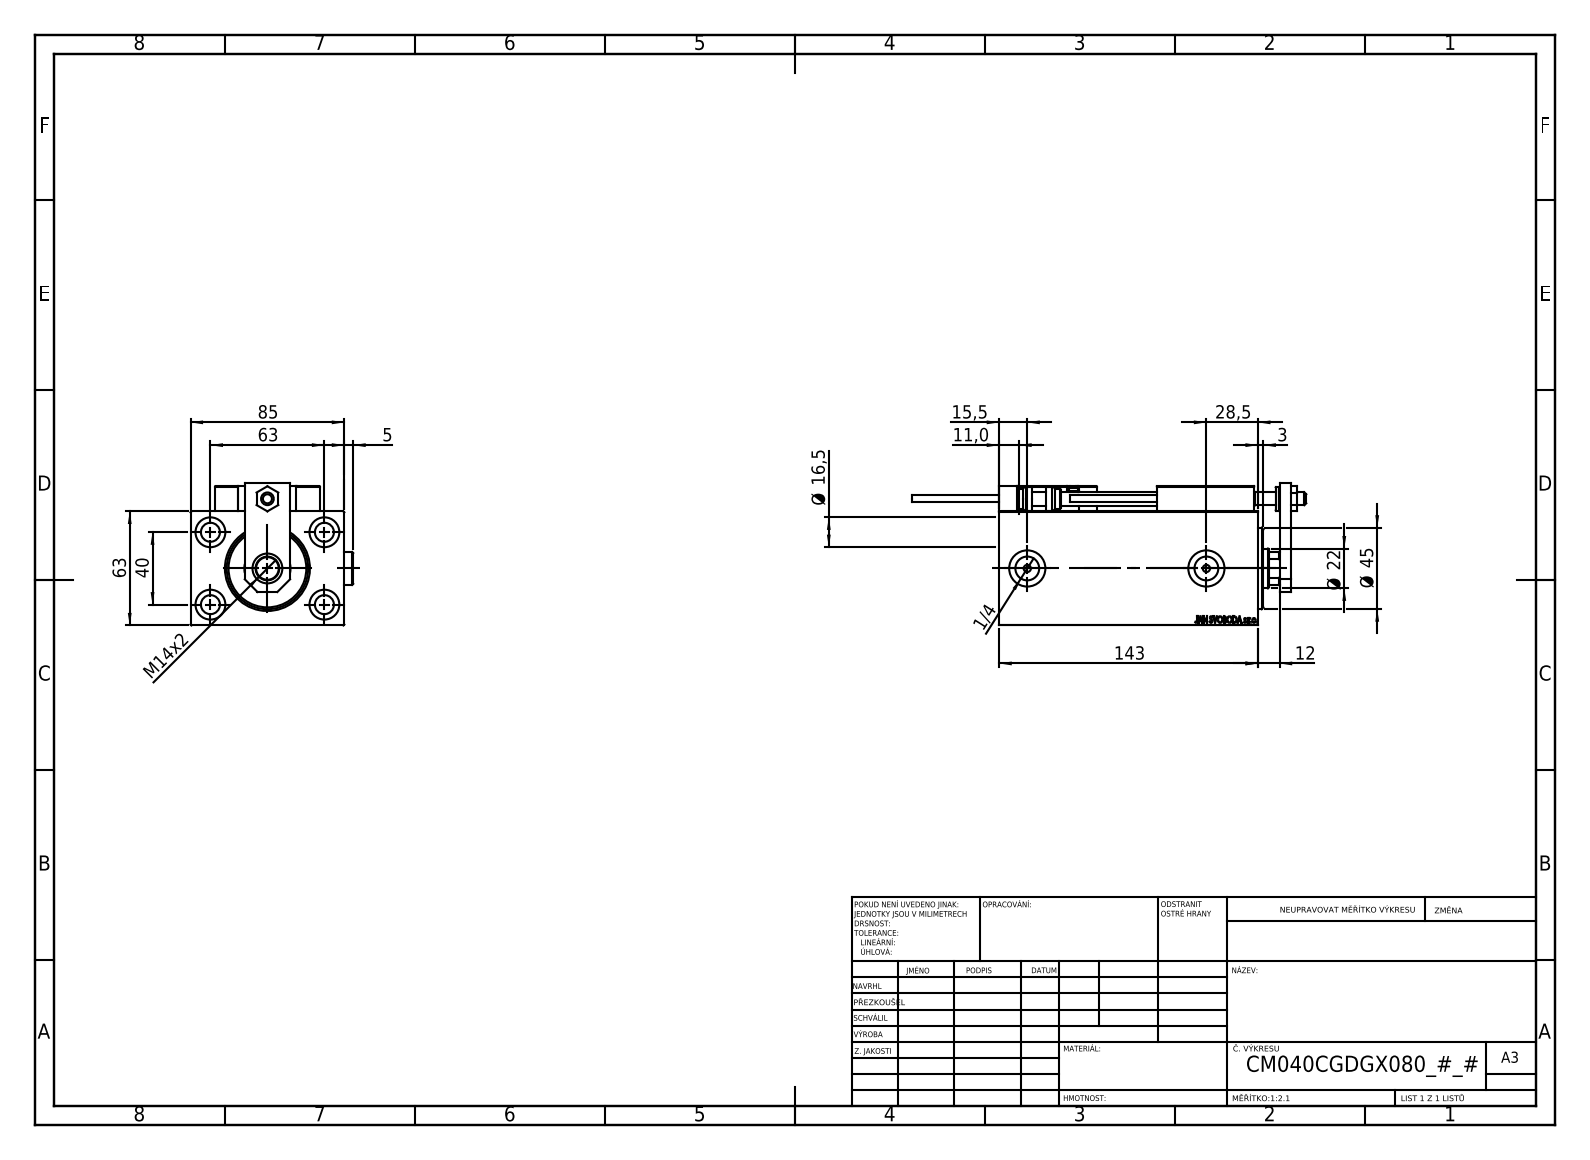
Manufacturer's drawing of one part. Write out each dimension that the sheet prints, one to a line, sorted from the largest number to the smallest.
143
85
63
63
Ø 45
40
28,5
Ø 22
Ø 16,5
15,5
M14x2
12
11,0
5
3
1/4
